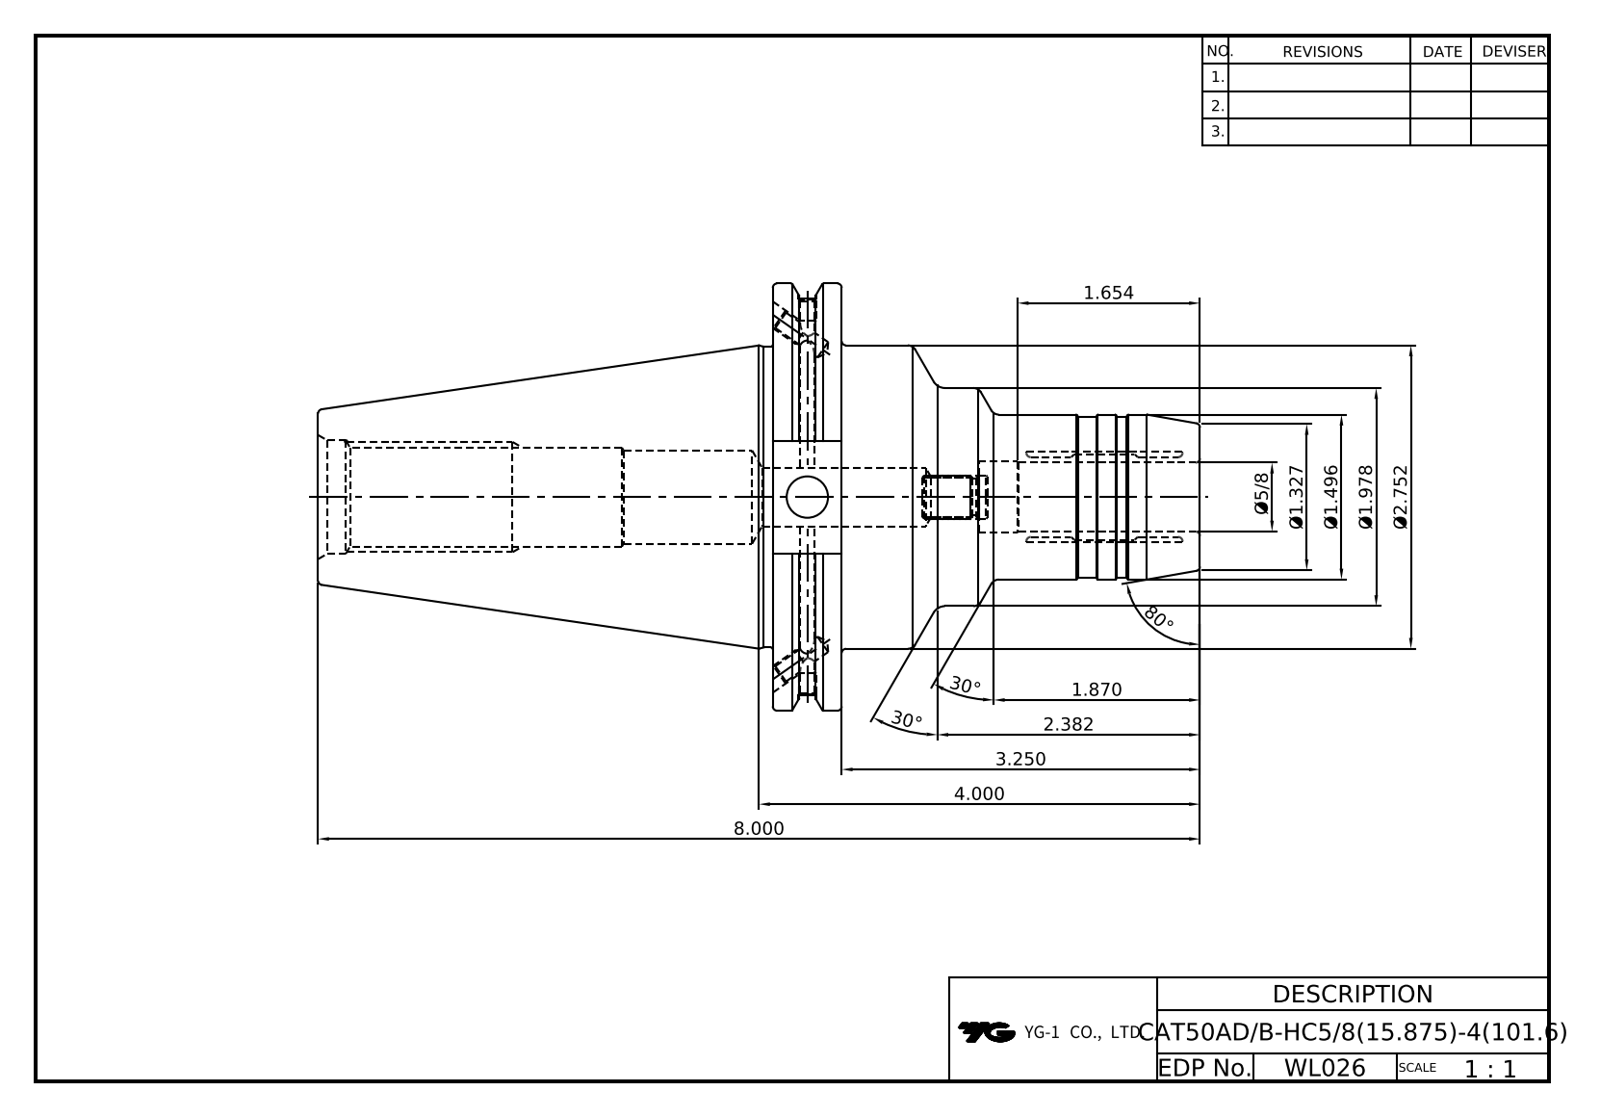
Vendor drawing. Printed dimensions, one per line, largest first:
80°
30°
30°
8.000
4.000
3.250
Ø2.752
2.382
Ø1.978
1.870
1.654
Ø1.496
Ø1.327
Ø5/8
